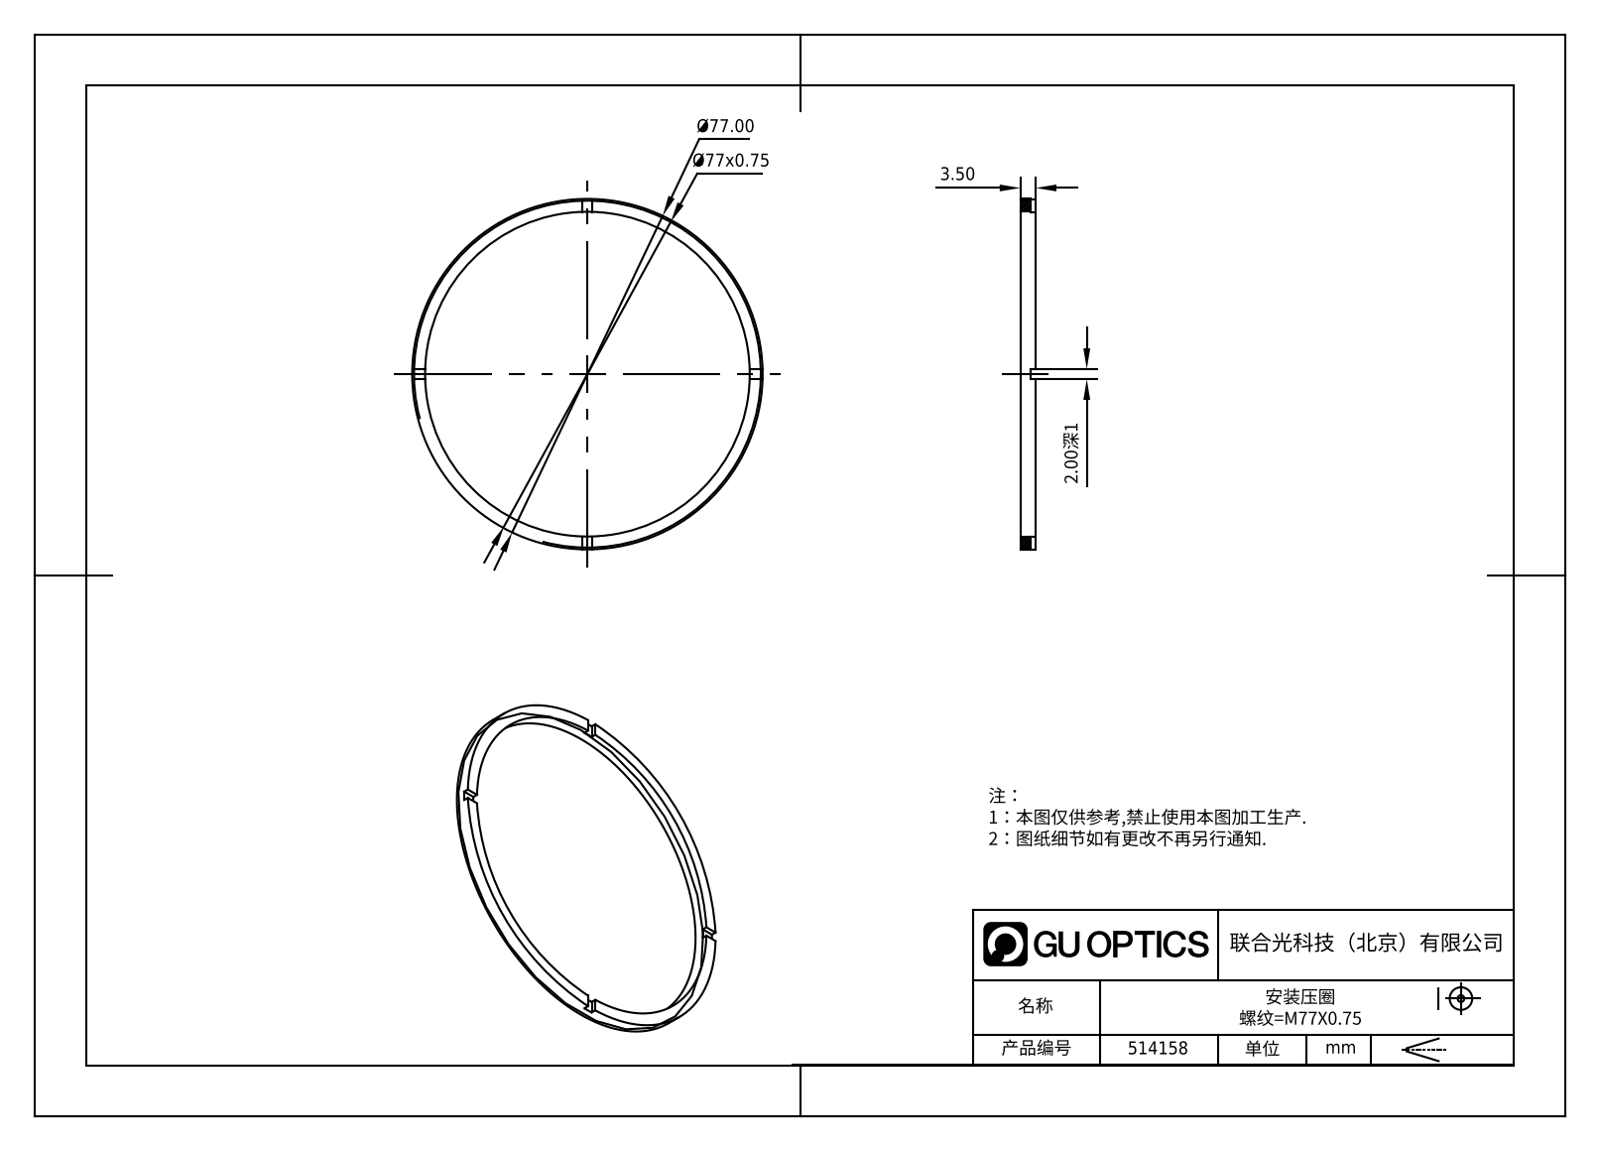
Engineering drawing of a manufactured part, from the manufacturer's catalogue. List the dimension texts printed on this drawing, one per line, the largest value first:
Ø77.00
Ø77x0.75
3.50
2.00深1
